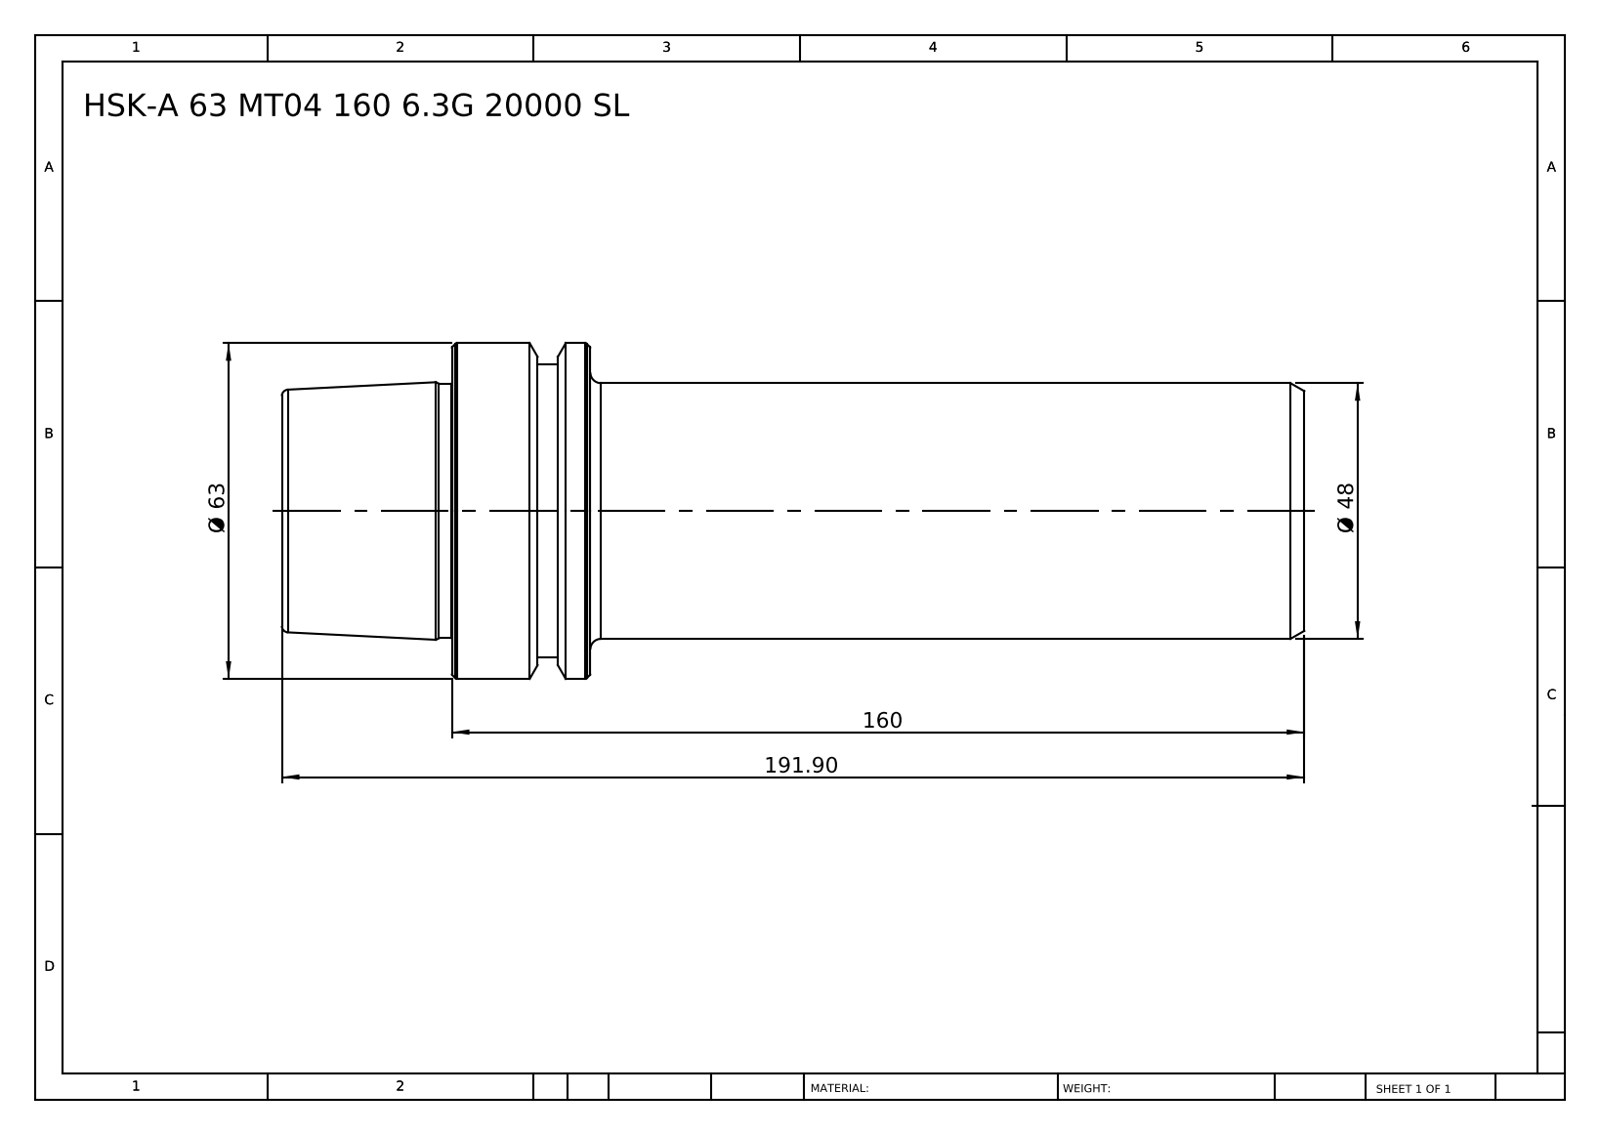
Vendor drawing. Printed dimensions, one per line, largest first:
191.90
160
Ø 63
Ø 48
